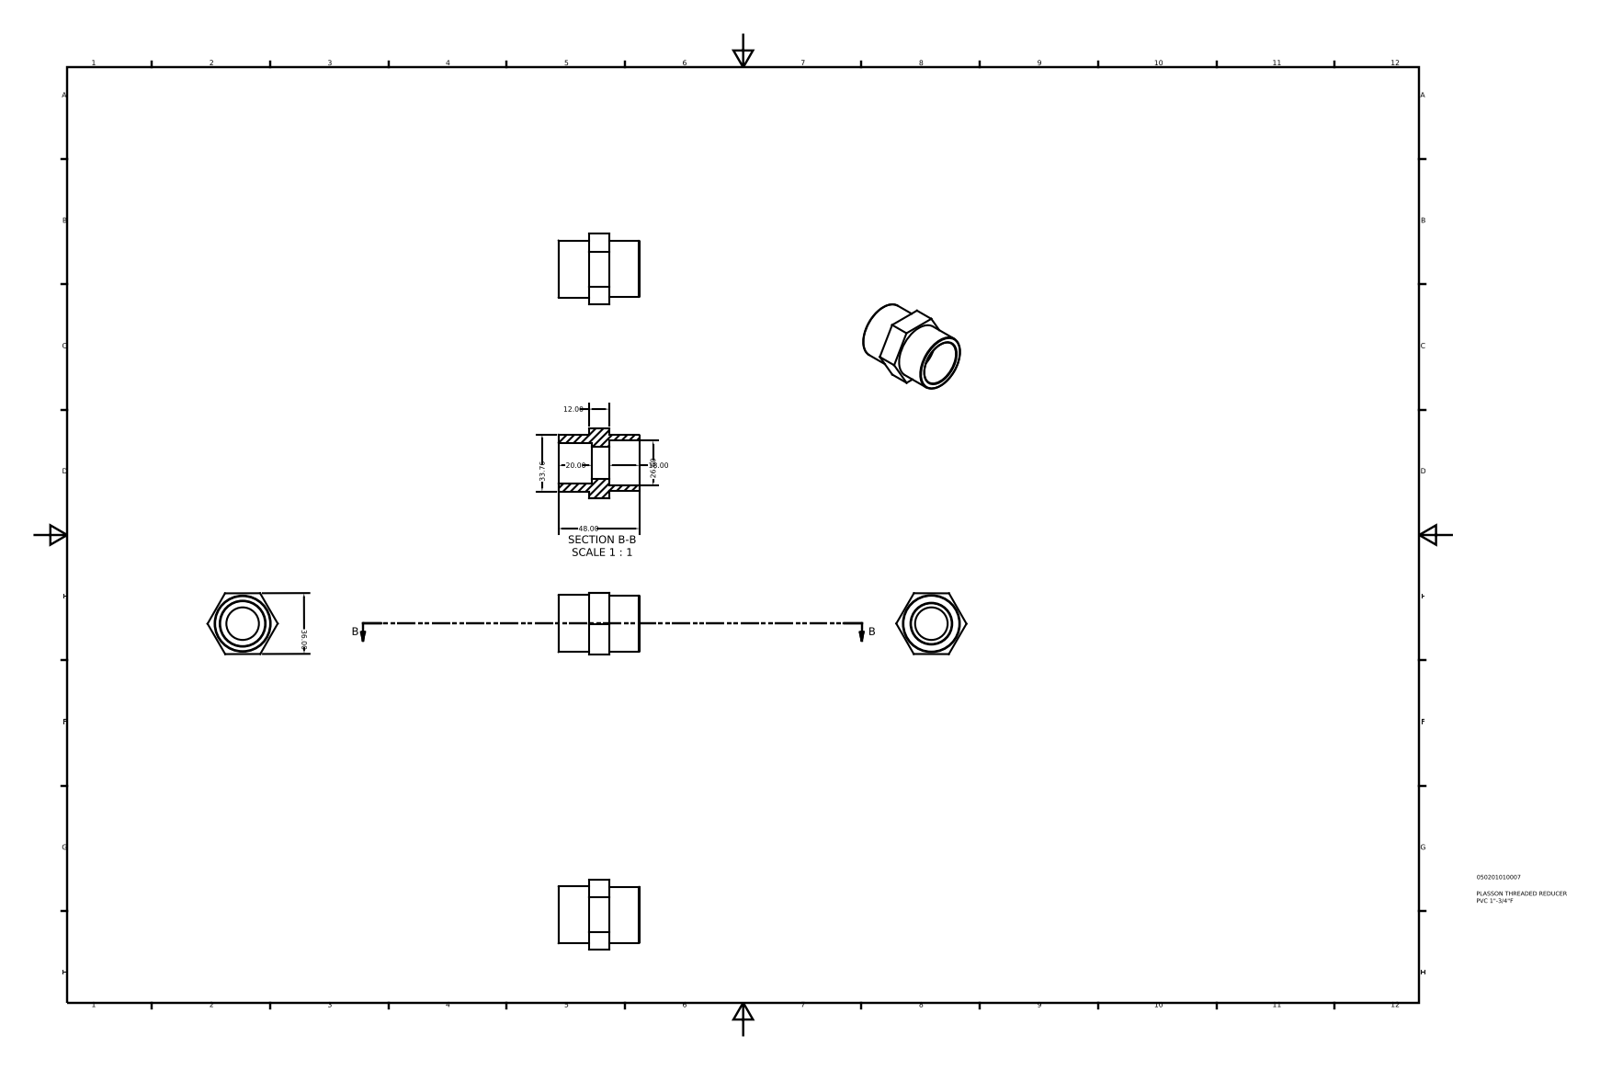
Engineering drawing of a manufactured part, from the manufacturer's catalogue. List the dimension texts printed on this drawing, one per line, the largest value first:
48.00
36.00
33.76
26.60
20.00
18.00
12.00
